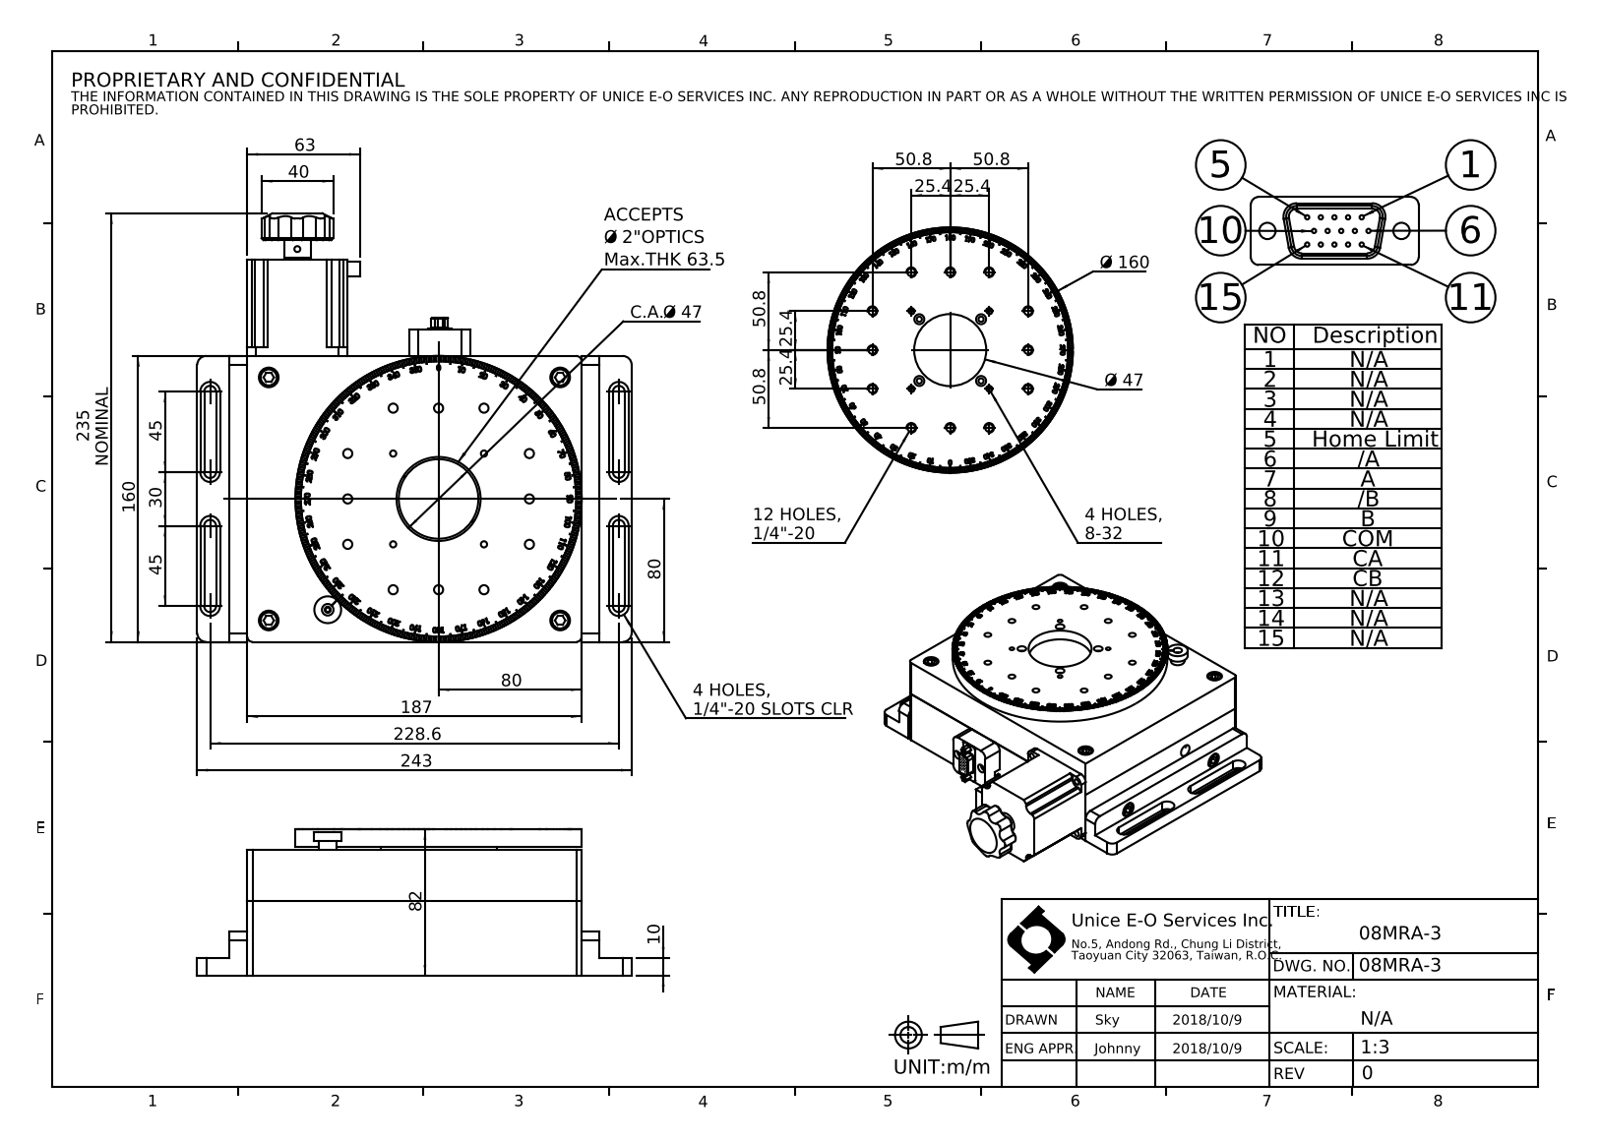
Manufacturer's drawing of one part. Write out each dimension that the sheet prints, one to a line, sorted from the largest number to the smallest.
243
235 NOMINAL
228.6
187
160
Ø 160
82
80
80
63
50.8
50.8
50.8
50.8
C.A. Ø 47
Ø 47
45
45
40
30
25.4
25.4
25.4
25.4
12 HOLES, 1/4"-20
10
4 HOLES, 1/4"-20 SLOTS CLR
4 HOLES, 8-32
